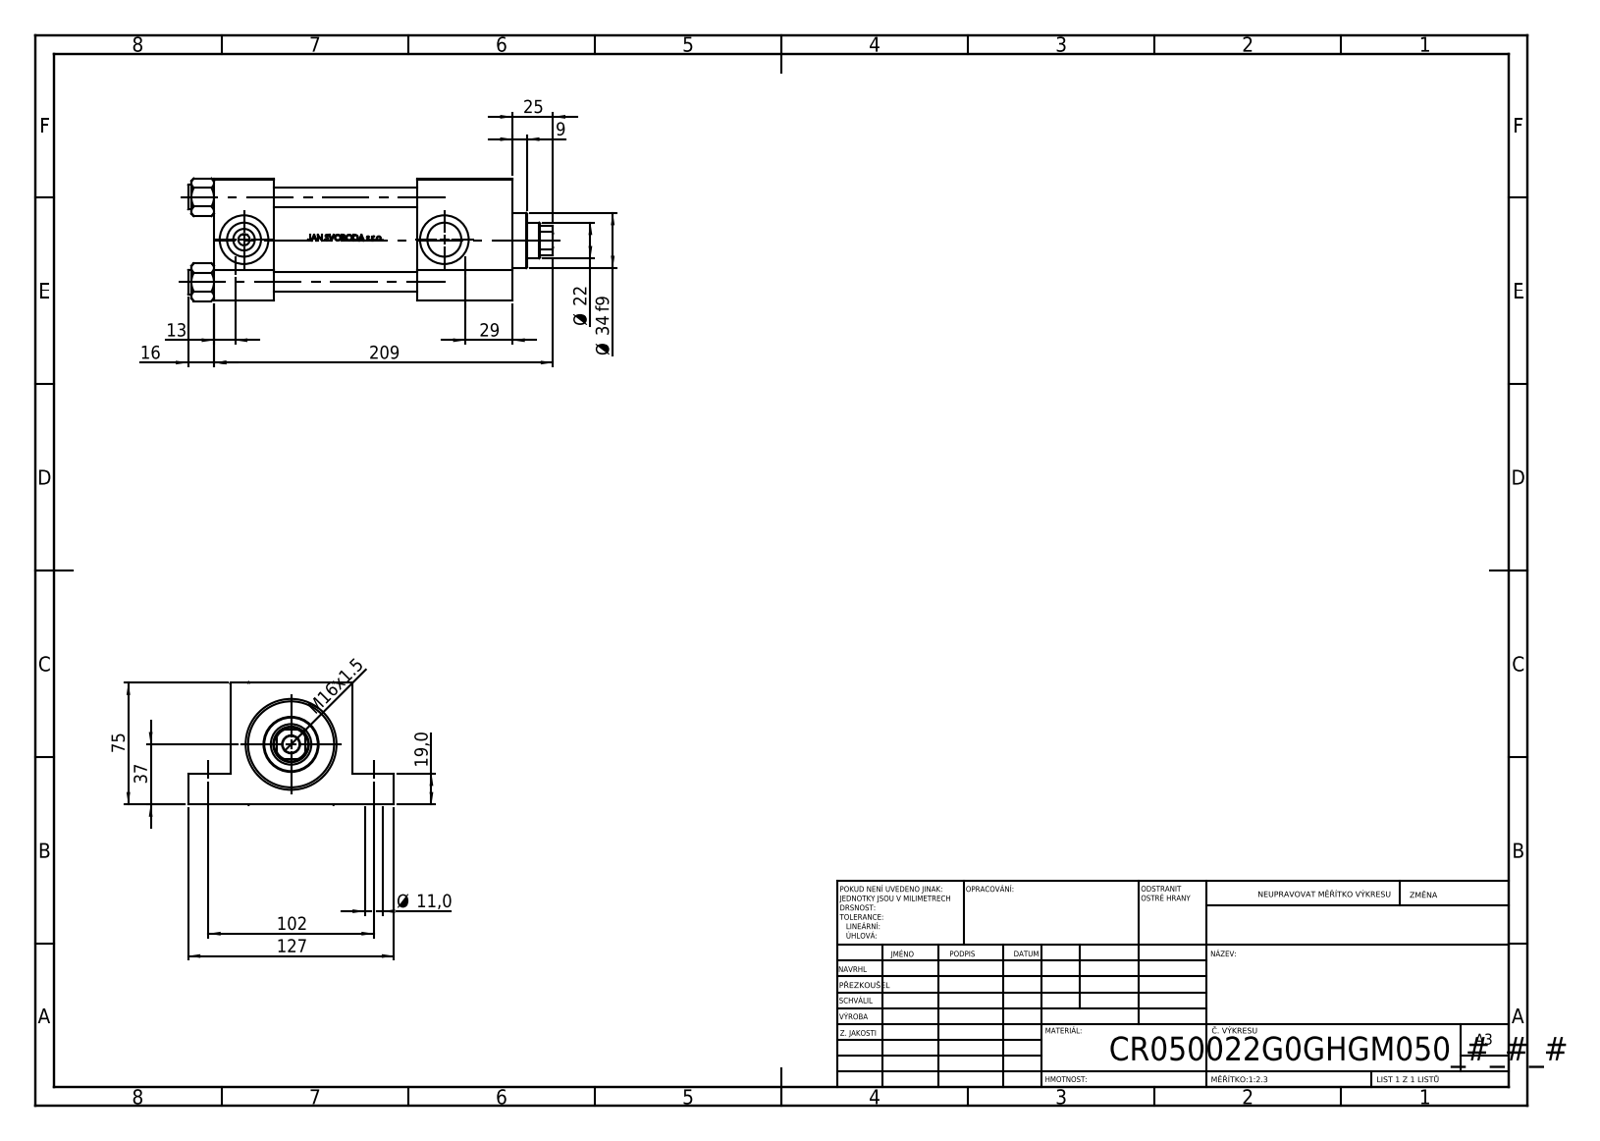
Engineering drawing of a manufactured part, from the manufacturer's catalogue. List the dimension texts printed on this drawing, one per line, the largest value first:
209
127
102
75
37
Ø 34 f9
29
25
Ø 22
19,0
16
M16x1.5
13
Ø 11,0
9
